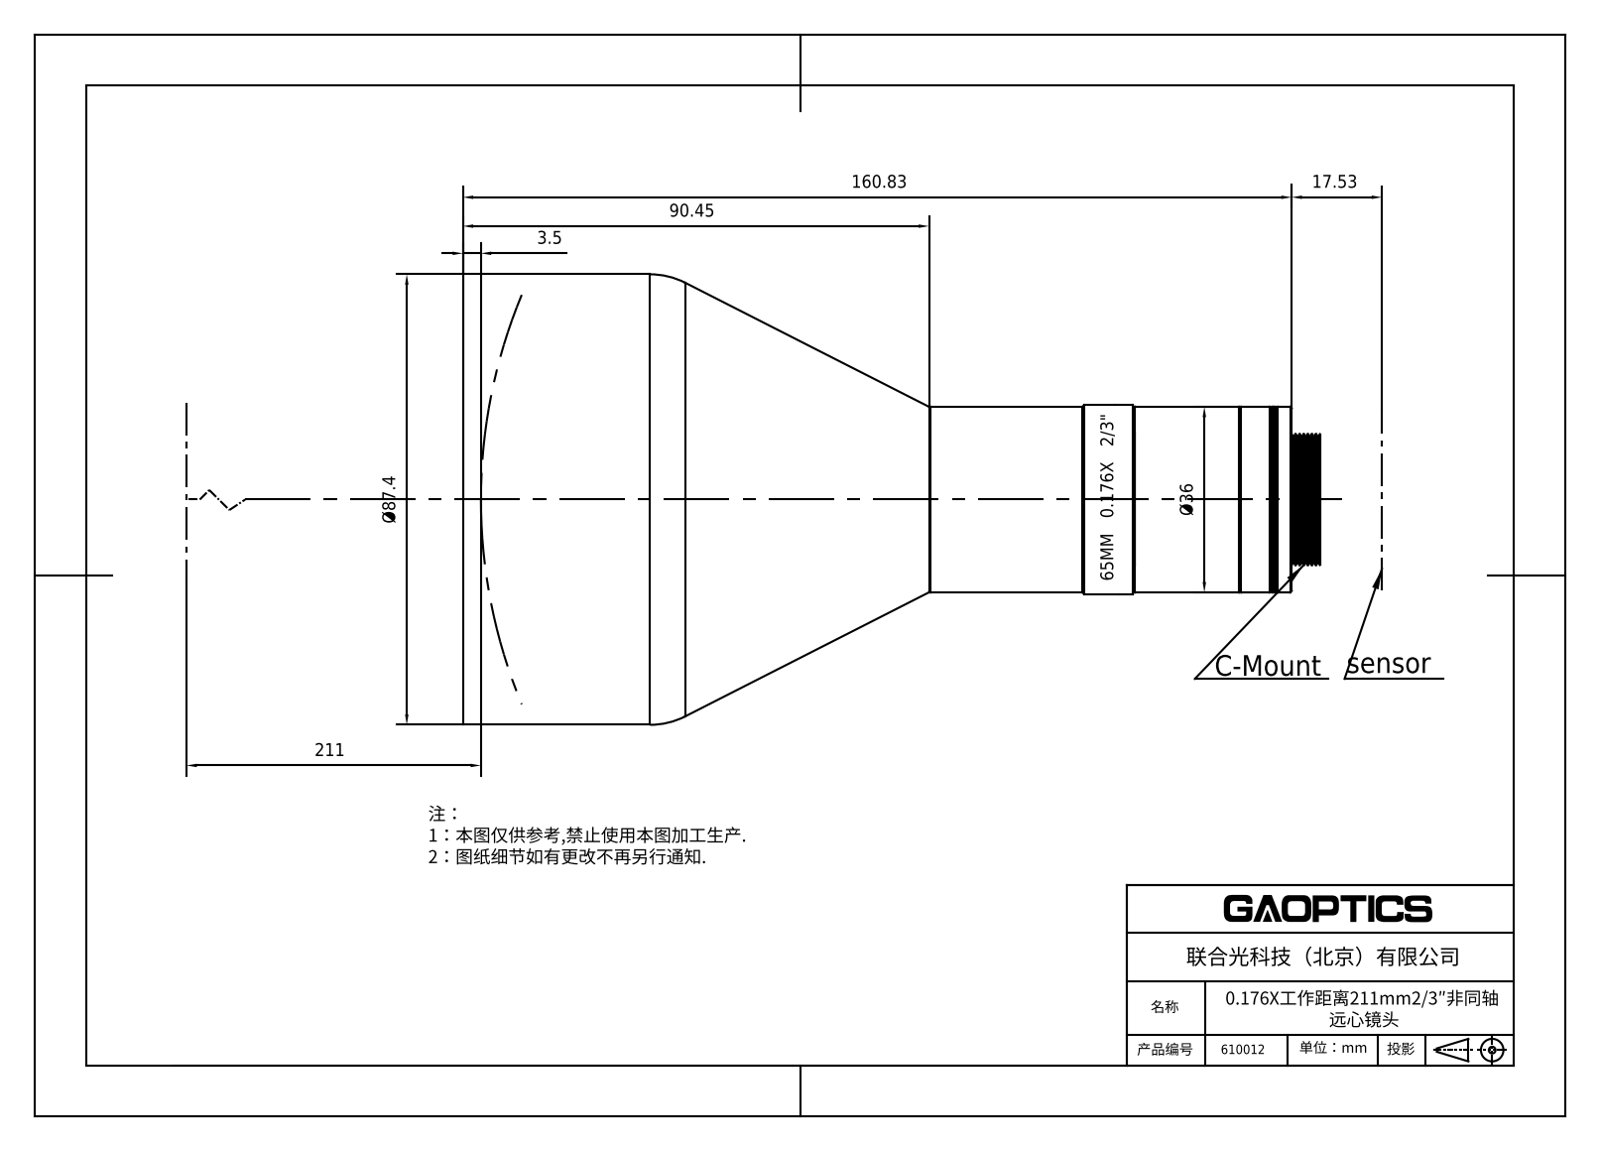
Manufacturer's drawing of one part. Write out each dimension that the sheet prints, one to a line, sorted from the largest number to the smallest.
211
160.83
90.45
Ø87.4
Ø36
17.53
3.5
